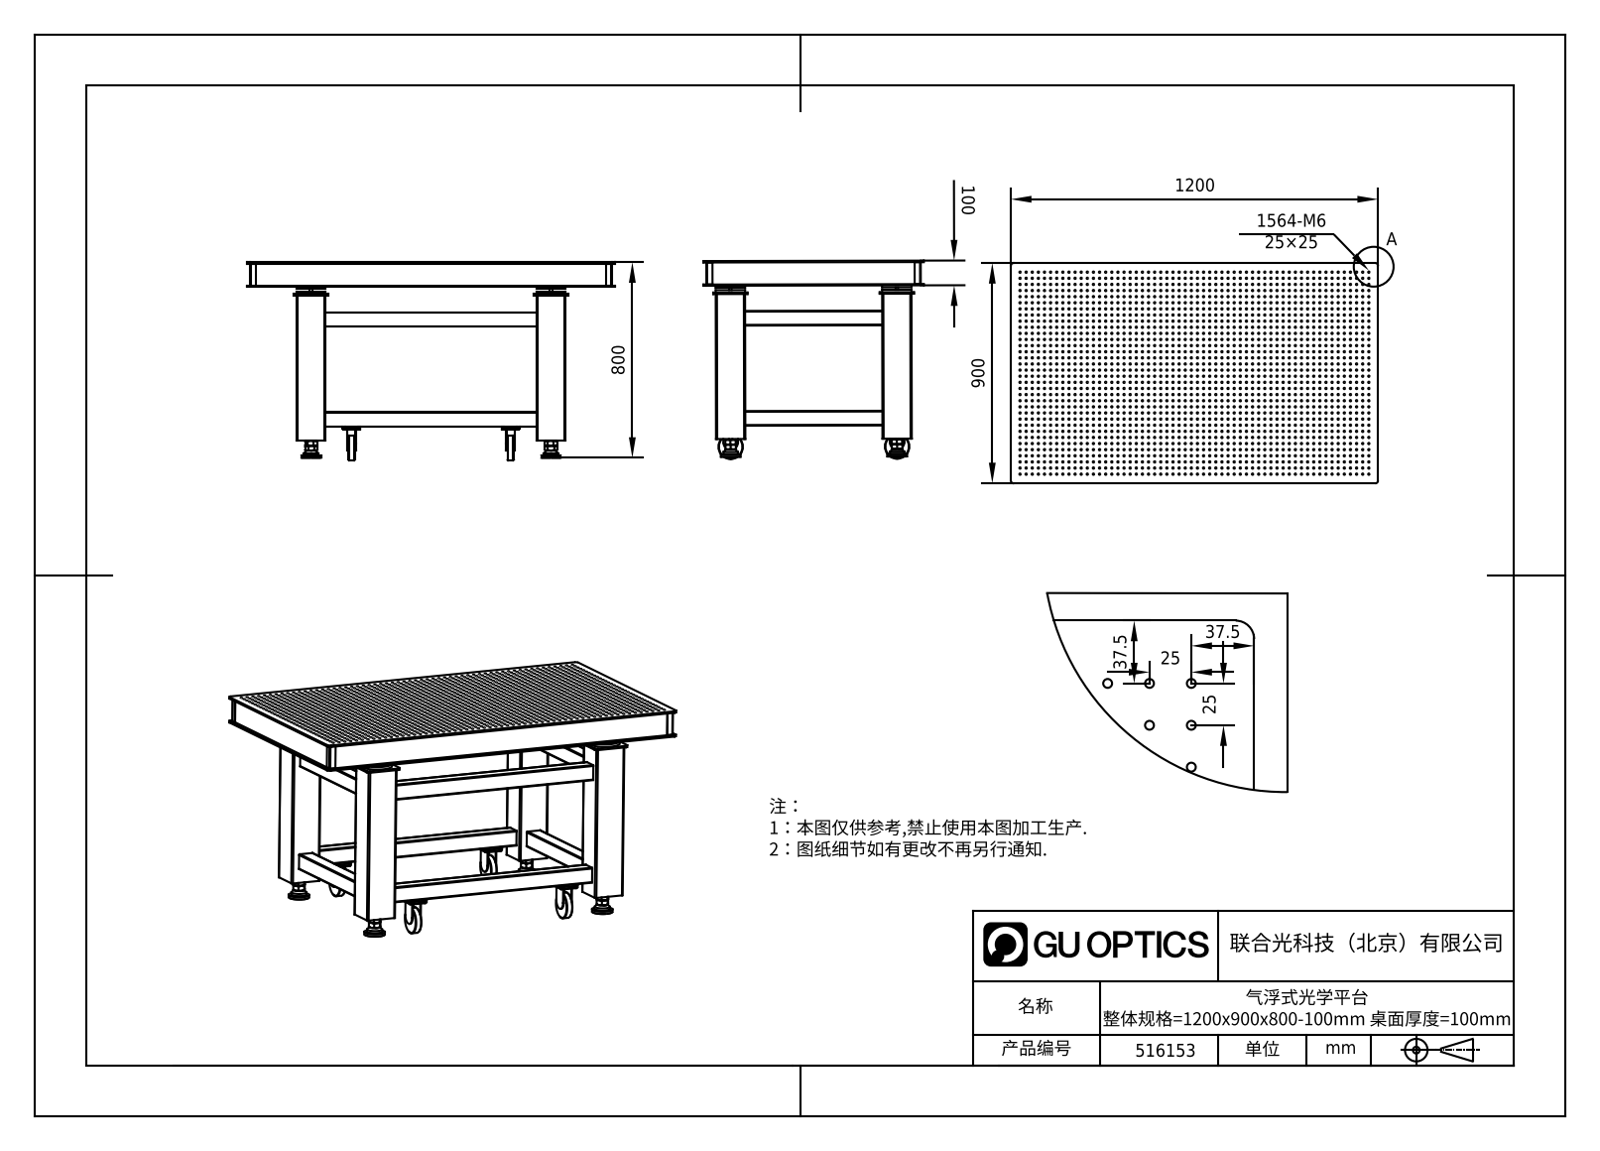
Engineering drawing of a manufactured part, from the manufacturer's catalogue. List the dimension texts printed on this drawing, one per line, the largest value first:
1200
900
800
100
37.5
37.5
25
25
